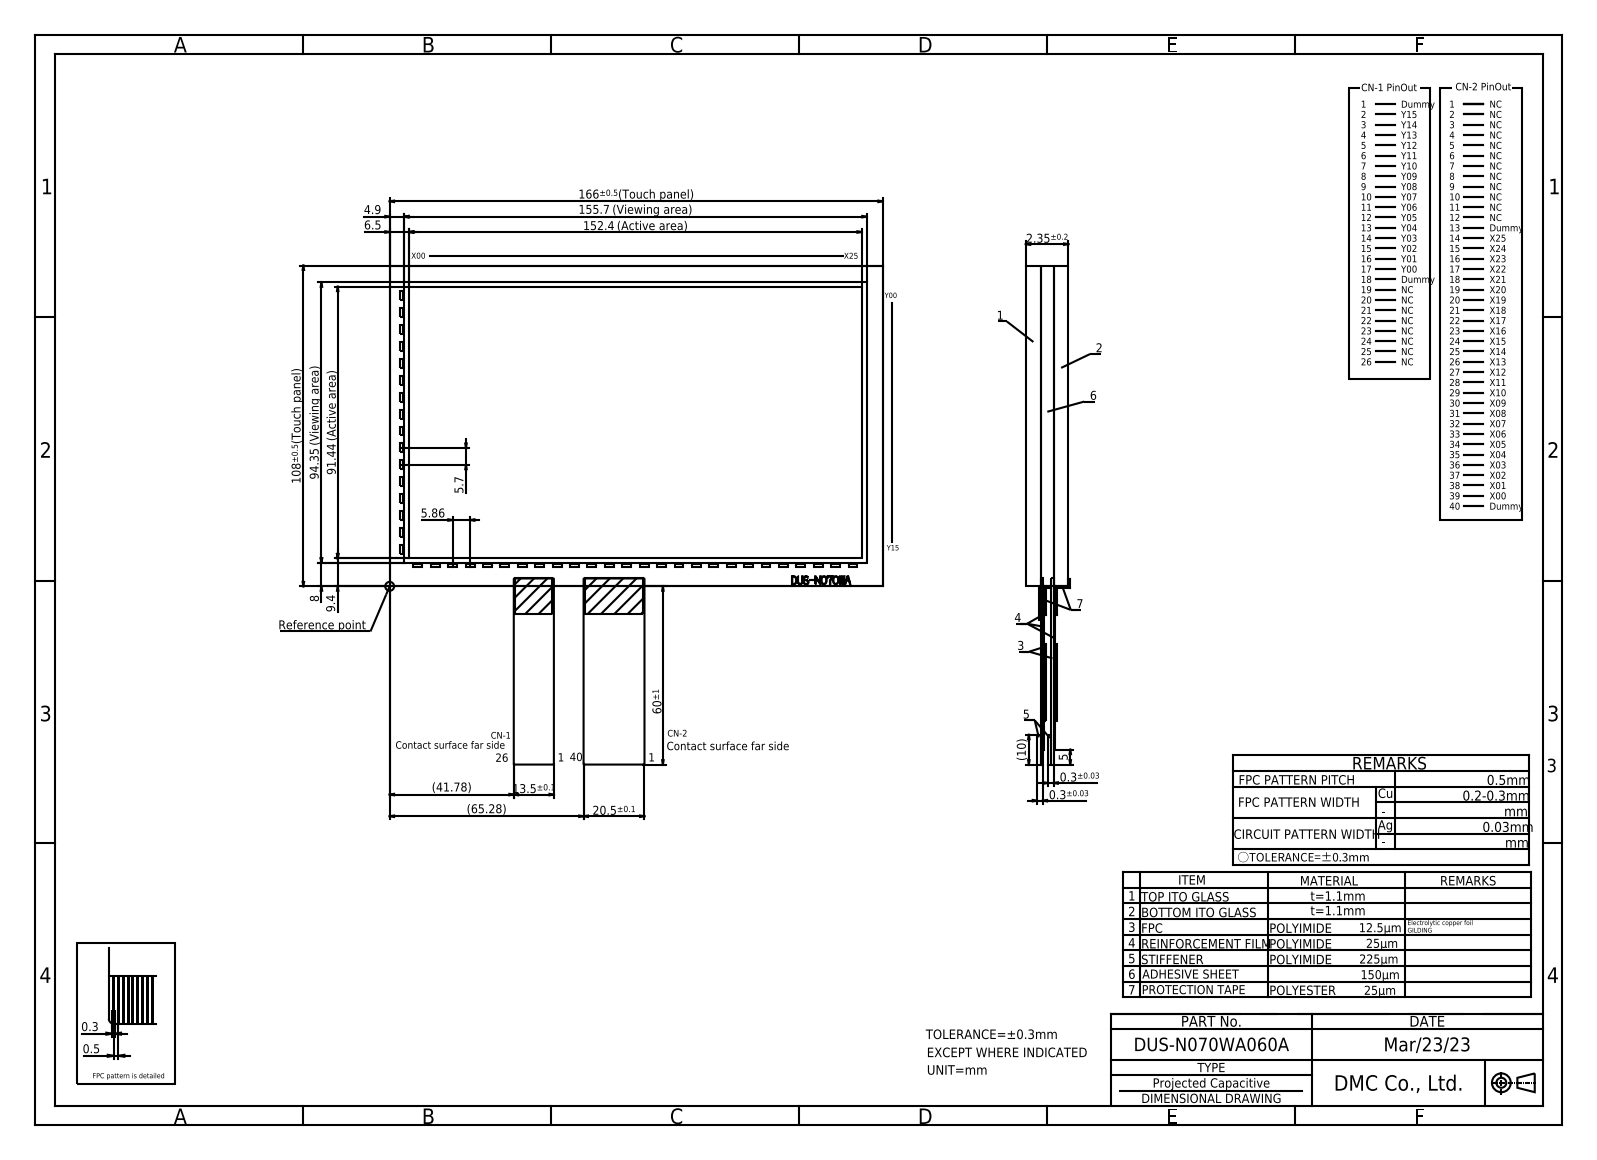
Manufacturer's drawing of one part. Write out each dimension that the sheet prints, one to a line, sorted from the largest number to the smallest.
166±0.5(Touch panel)
155.7 (Viewing area)
152.4 (Active area)
108±0.5(Touch panel)
94.35 (Viewing area)
91.44 (Active area)
(65.28)
60±1
(41.78)
20.5±0.1
13.5±0.1
(10)
9.4
8
6.5
5.86
5.7
5
4.9
2.35±0.2
0.5
0.3
0.3±0.03
0.3±0.03
